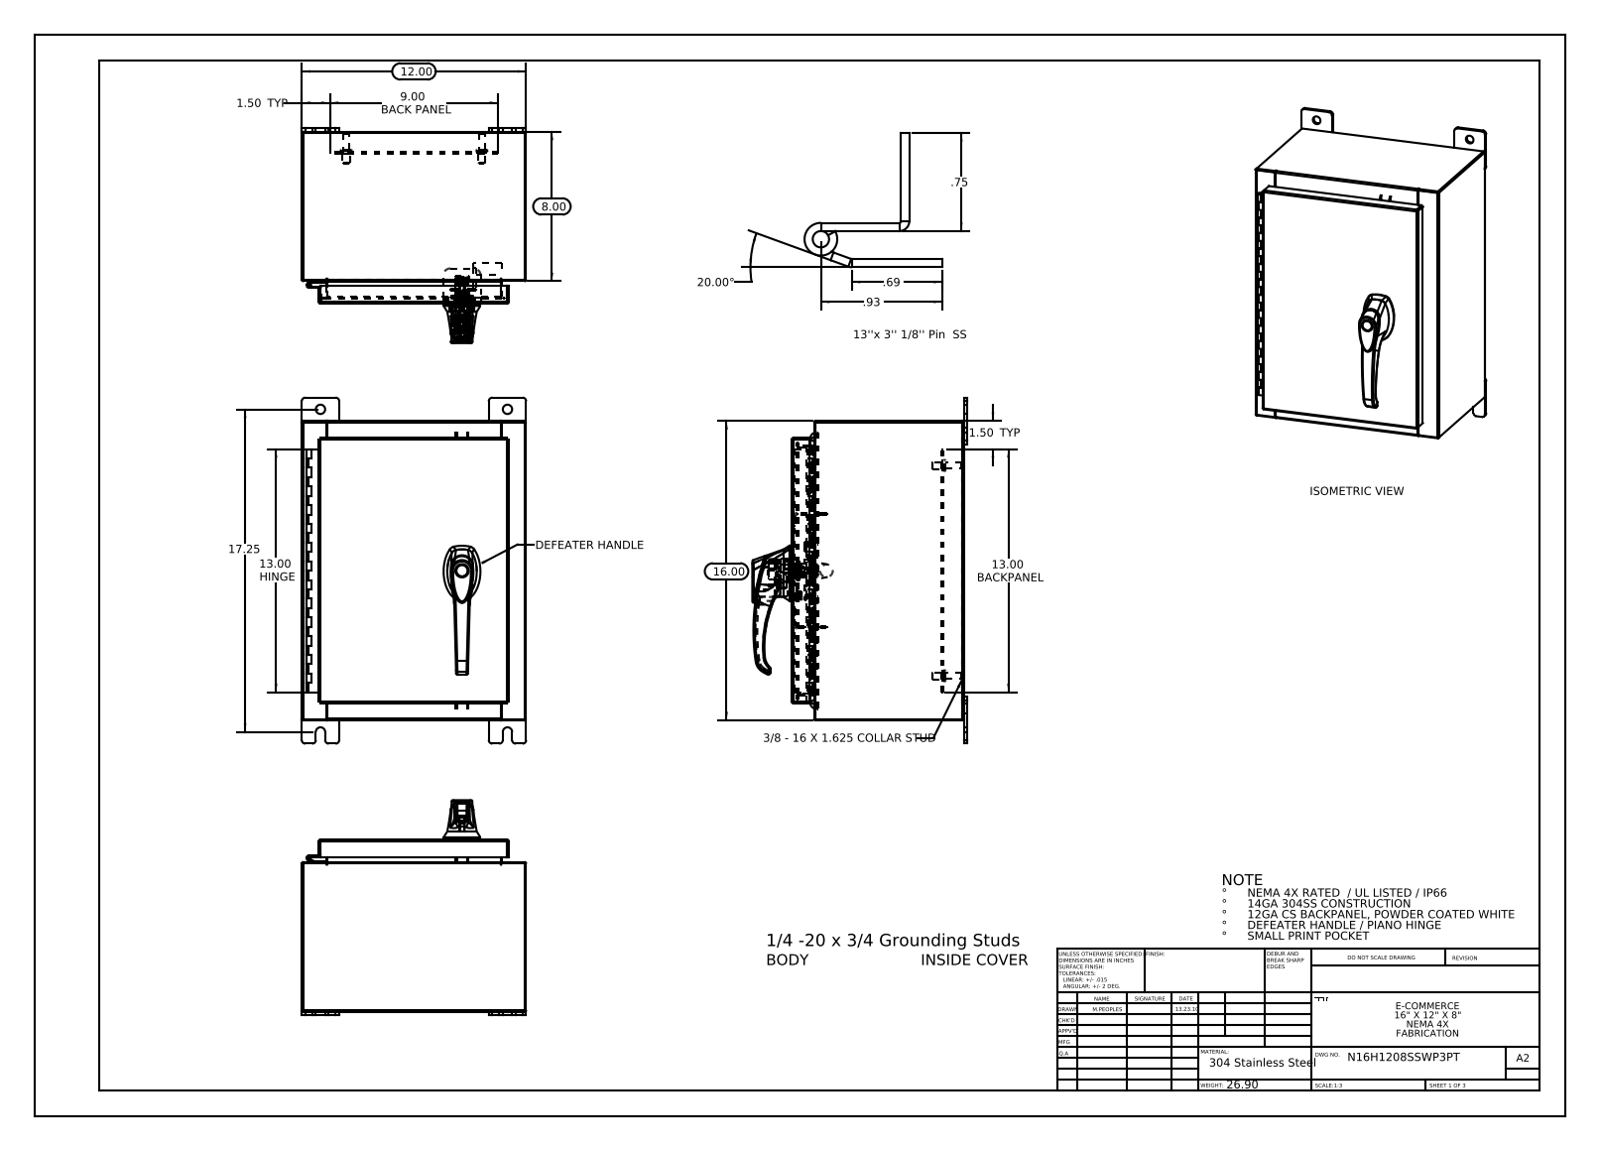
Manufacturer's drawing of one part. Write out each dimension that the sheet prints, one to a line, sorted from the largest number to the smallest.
20.00°
17.25
16.00
13.00 HINGE
13.00 BACKPANEL
12.00
9.00 BACK PANEL
8.00
1.50 TYP
1.50 TYP
.93
.75
.69
